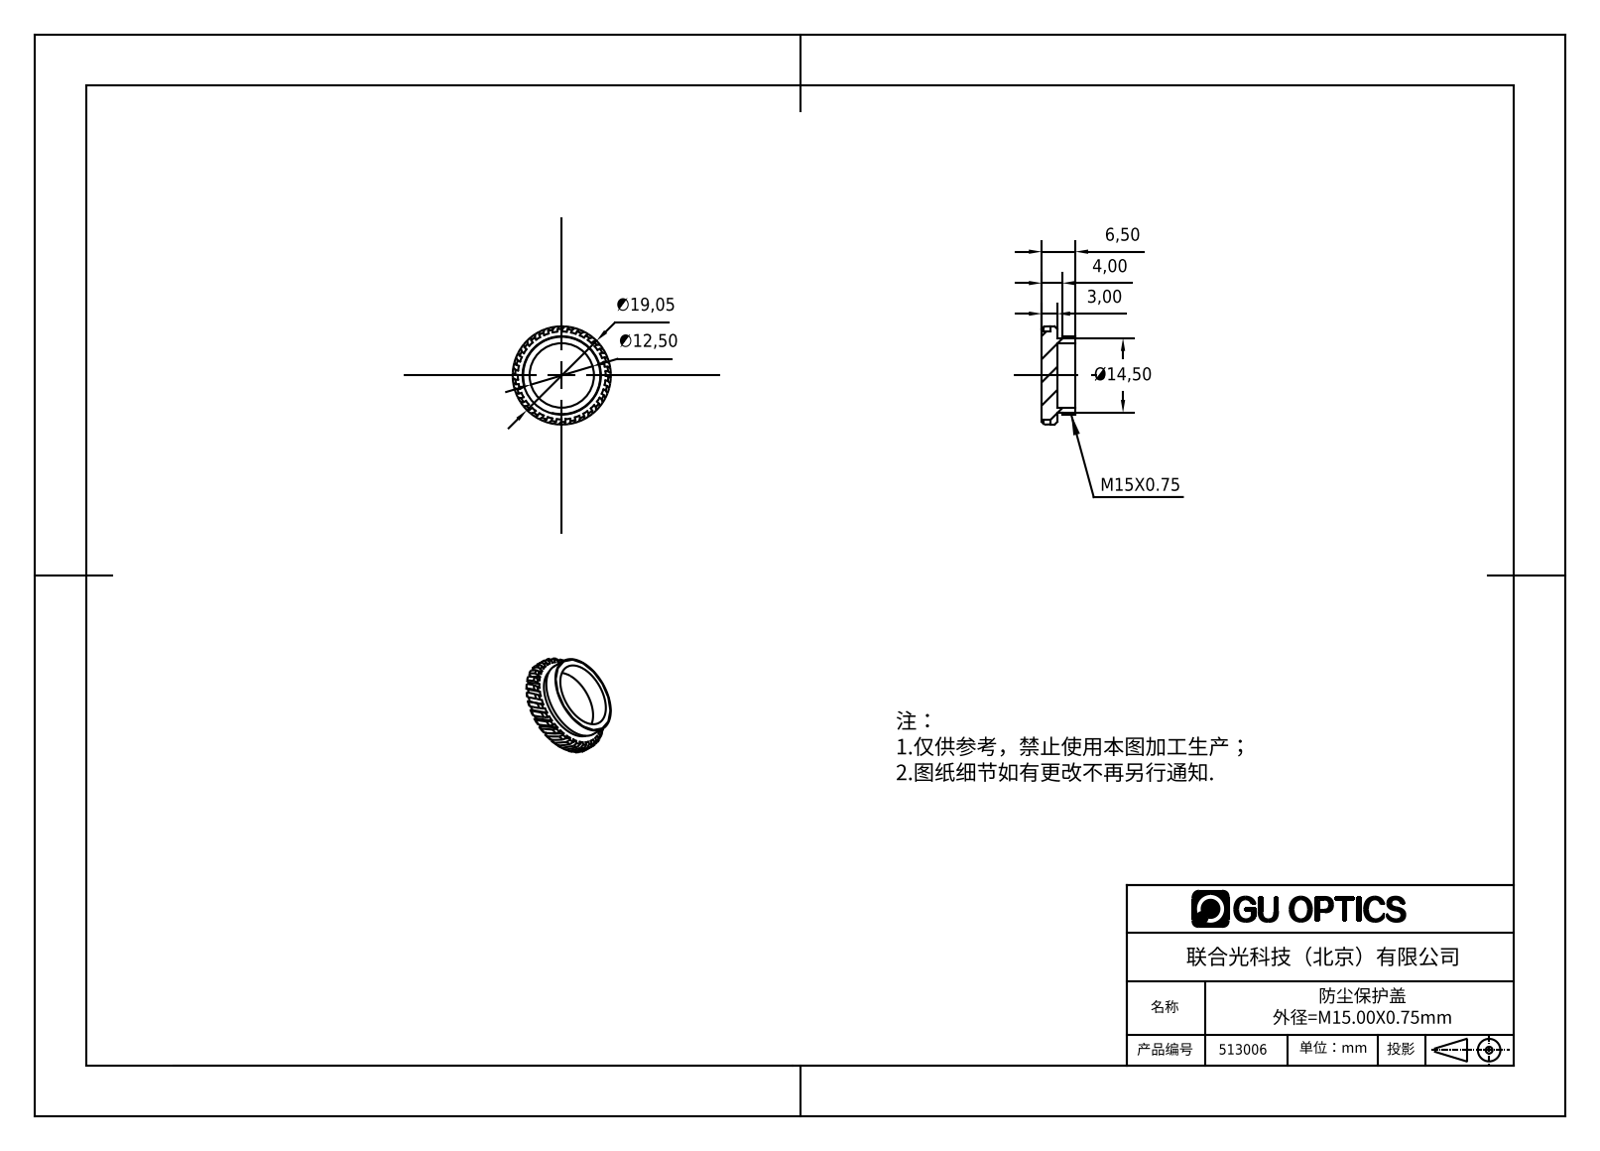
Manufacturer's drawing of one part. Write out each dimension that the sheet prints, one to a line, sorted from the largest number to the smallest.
∅19,05
Ø14,50
∅12,50
6,50
4,00
3,00
